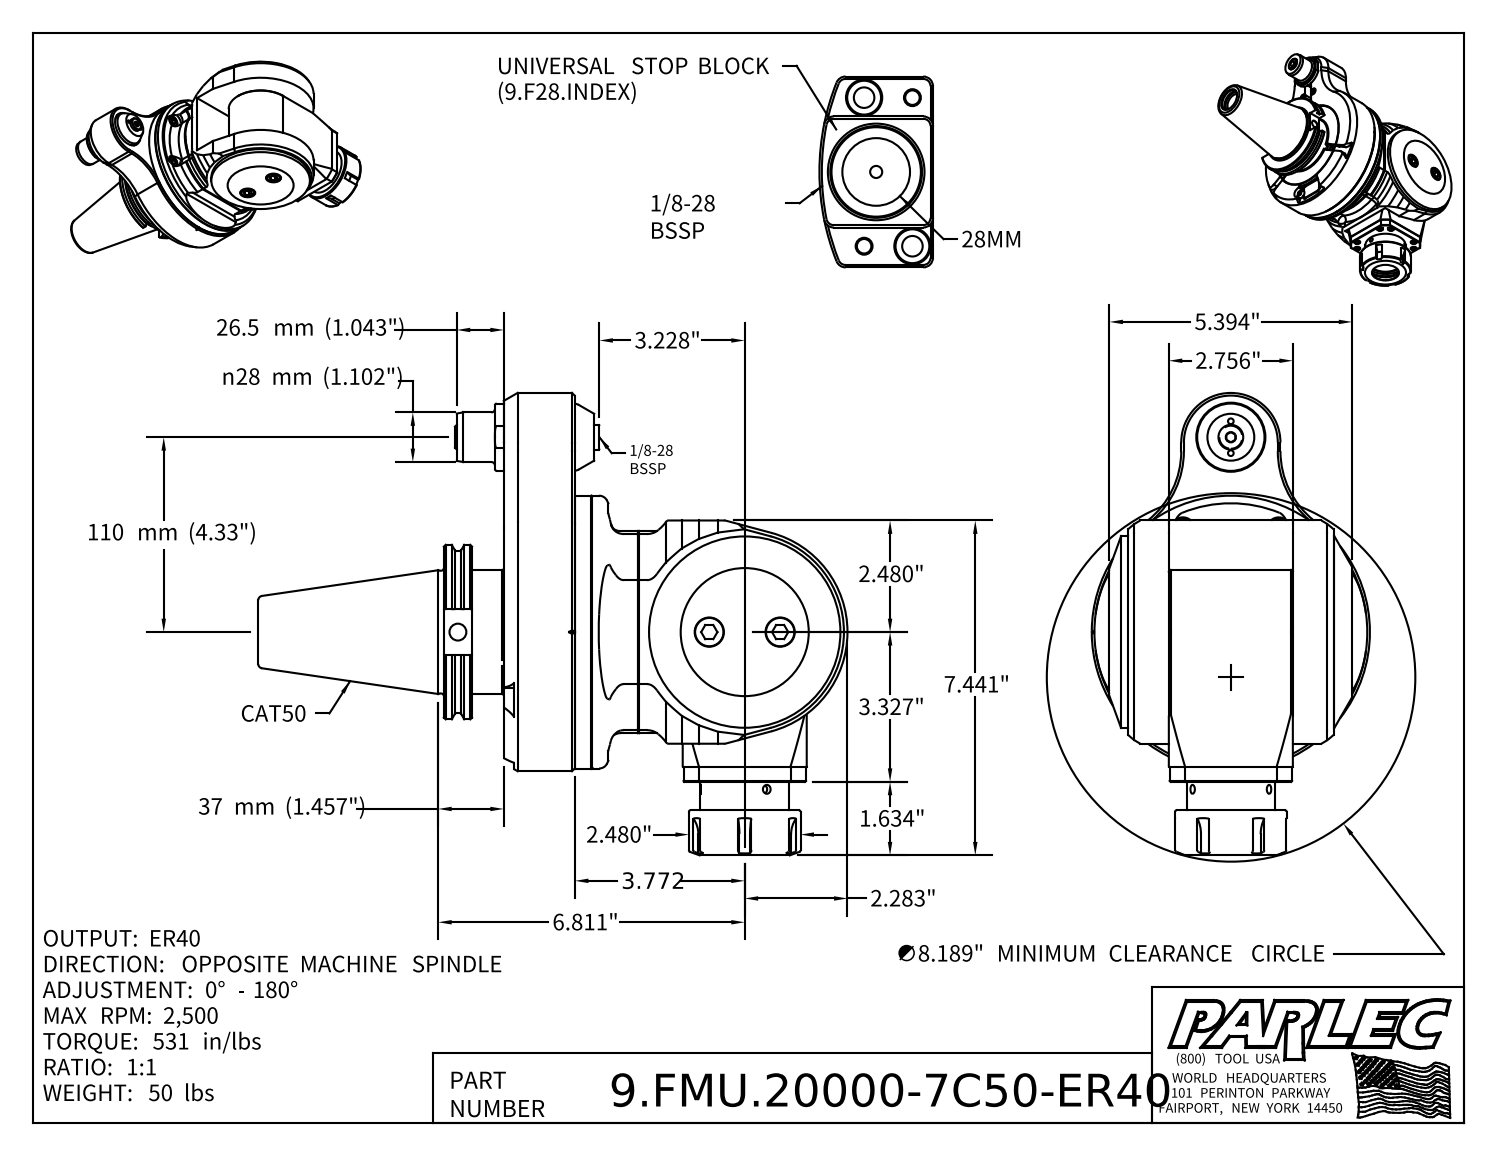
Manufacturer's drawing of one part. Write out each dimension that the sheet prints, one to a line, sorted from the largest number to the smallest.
110 mm (4.33")
37 mm (1.457")
n28 mm (1.102")
26.5 mm (1.043")
∅8.189" MINIMUM CLEARANCE CIRCLE
7.441"
6.811"
5.394"
3.772
3.327"
3.228"
2.756"
2.480"
2.480"
2.283"
1.634"
